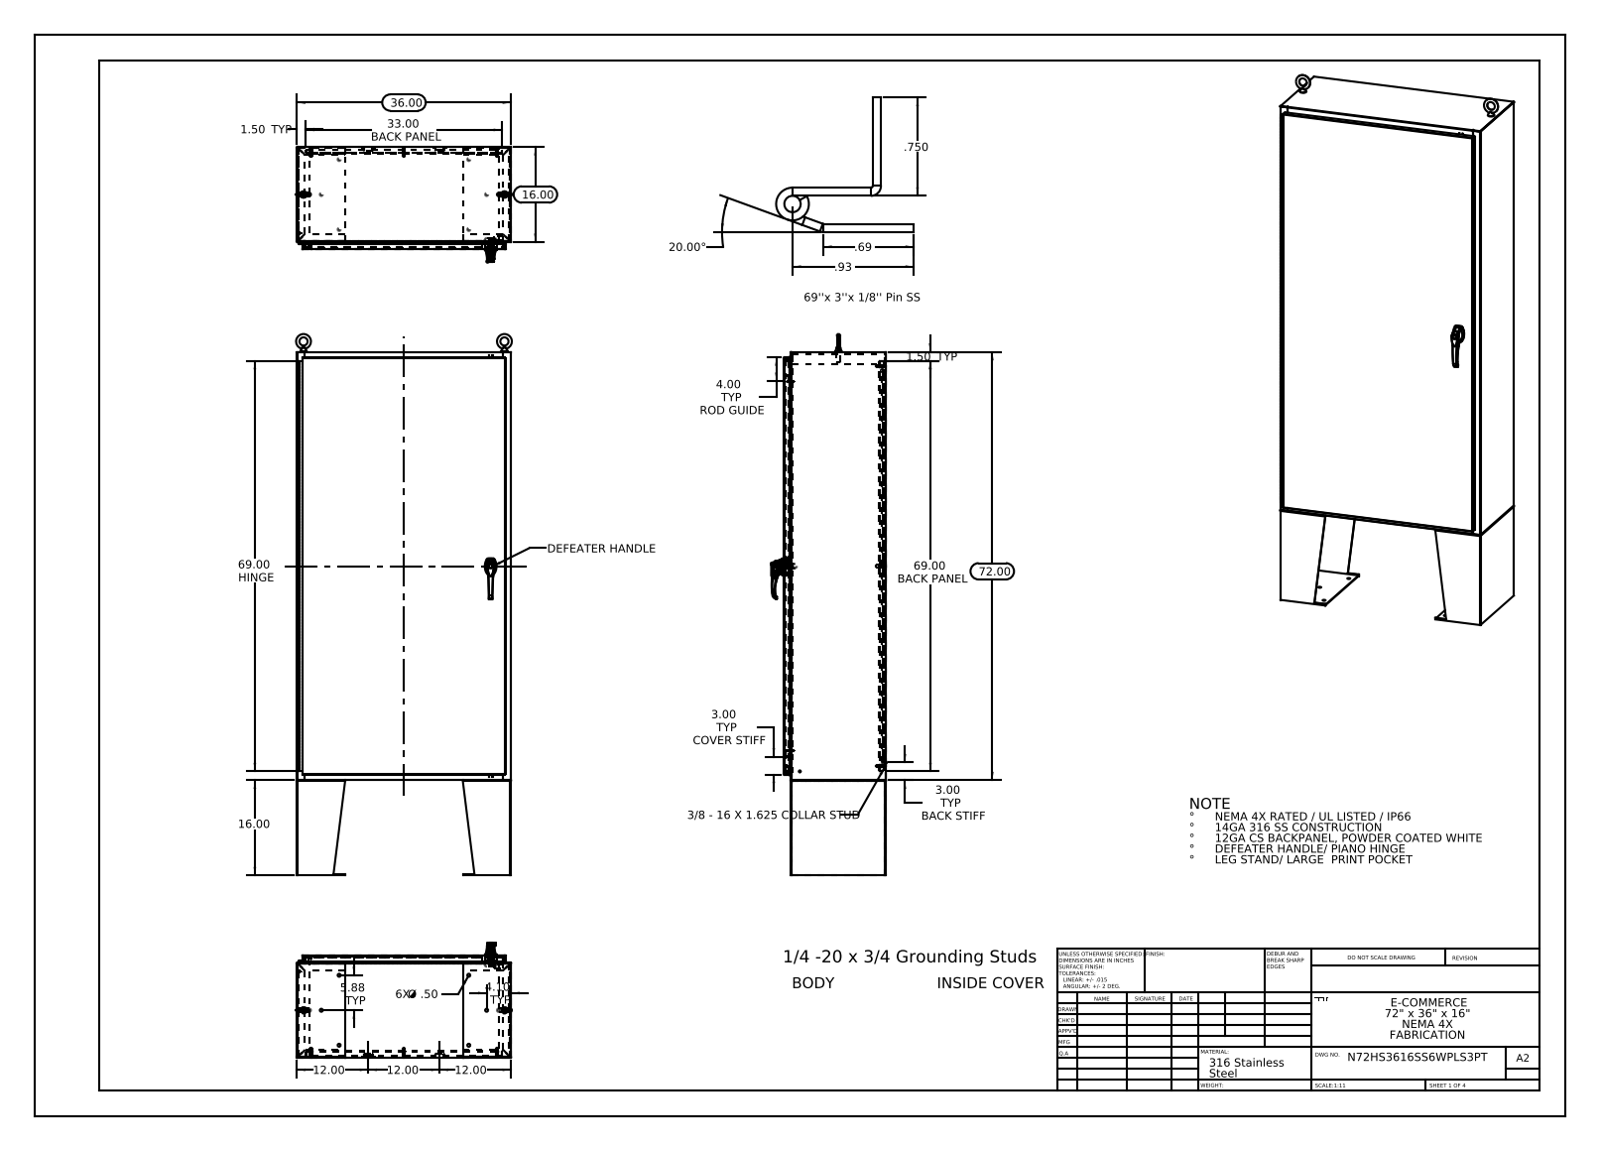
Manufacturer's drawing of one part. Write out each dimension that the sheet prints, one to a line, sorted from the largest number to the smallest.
72.00
69.00 HINGE
69.00 BACK PANEL
36.00
33.00 BACK PANEL
20.00°
16.00
16.00
12.00
12.00
12.00
5.88 TYP
4.10 TYP
4.00 TYP ROD GUIDE
3.00 TYP COVER STIFF
3.00 TYP BACK STIFF
1.50 TYP
1.50 TYP
.93
.750
.69
6X Ø .50
